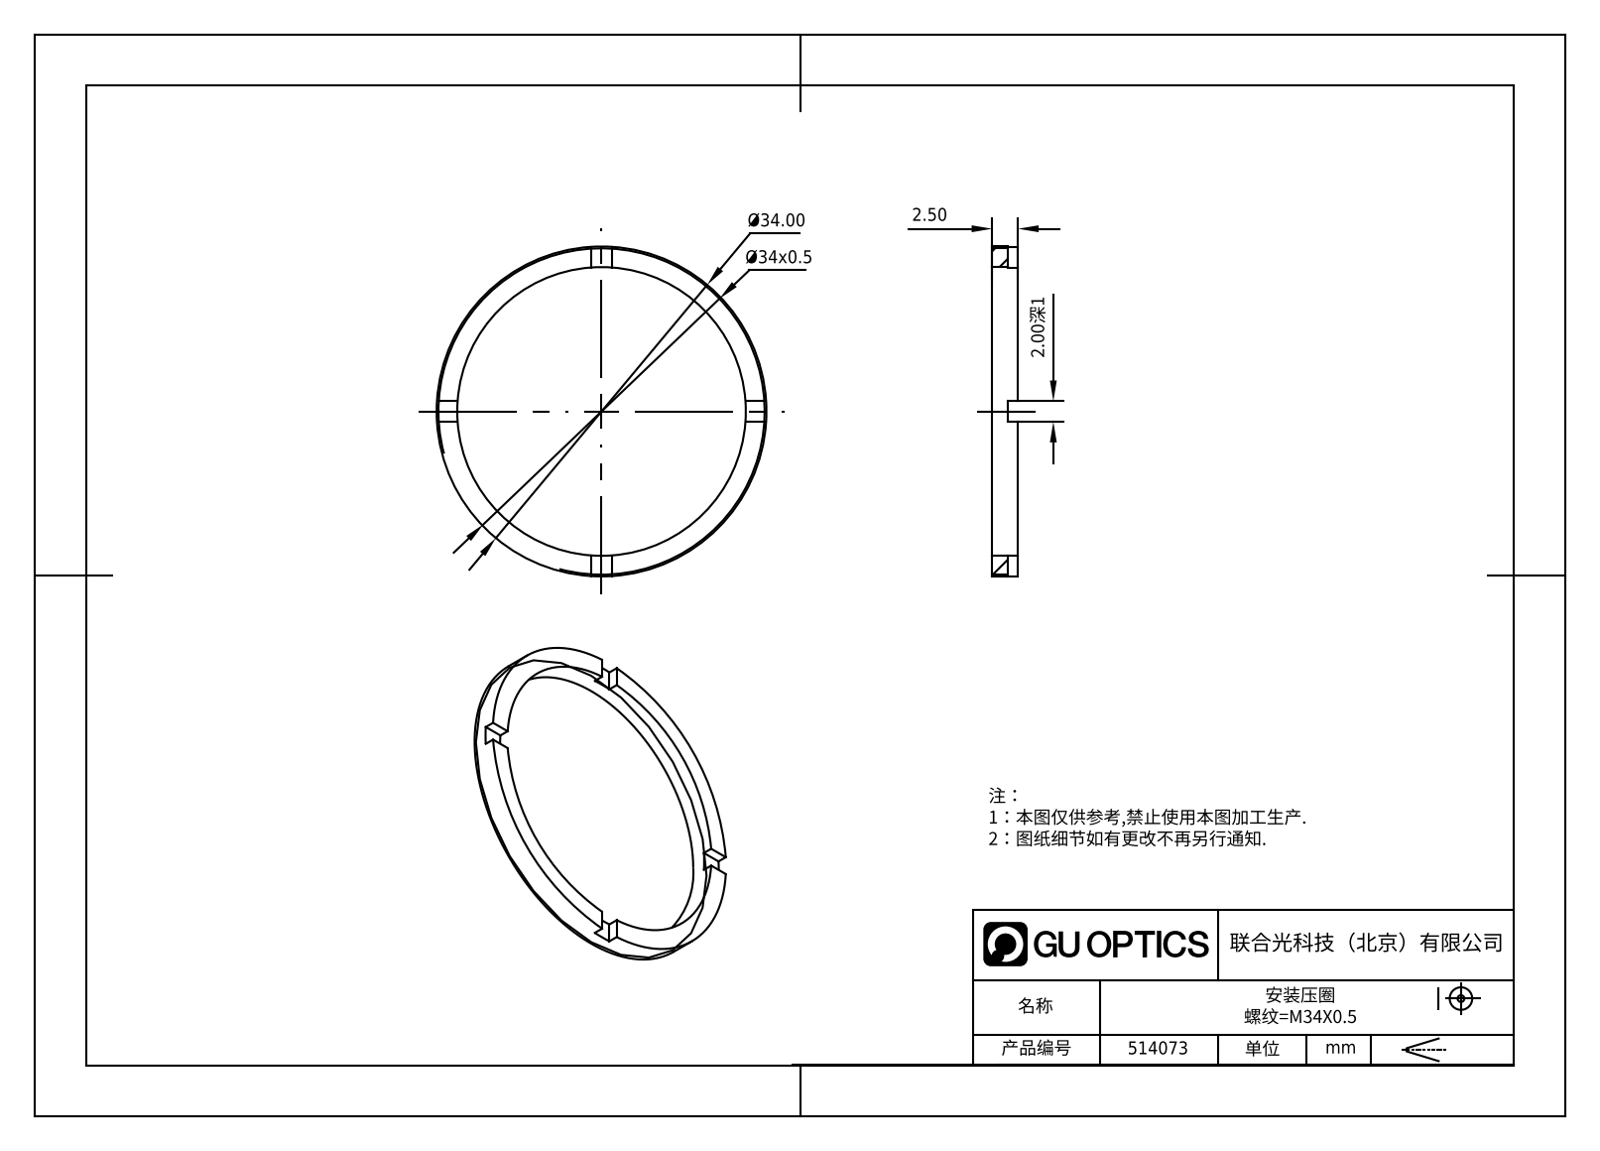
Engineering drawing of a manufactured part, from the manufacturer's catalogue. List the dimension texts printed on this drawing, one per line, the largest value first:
Ø34.00
Ø34x0.5
2.50
2.00深1
